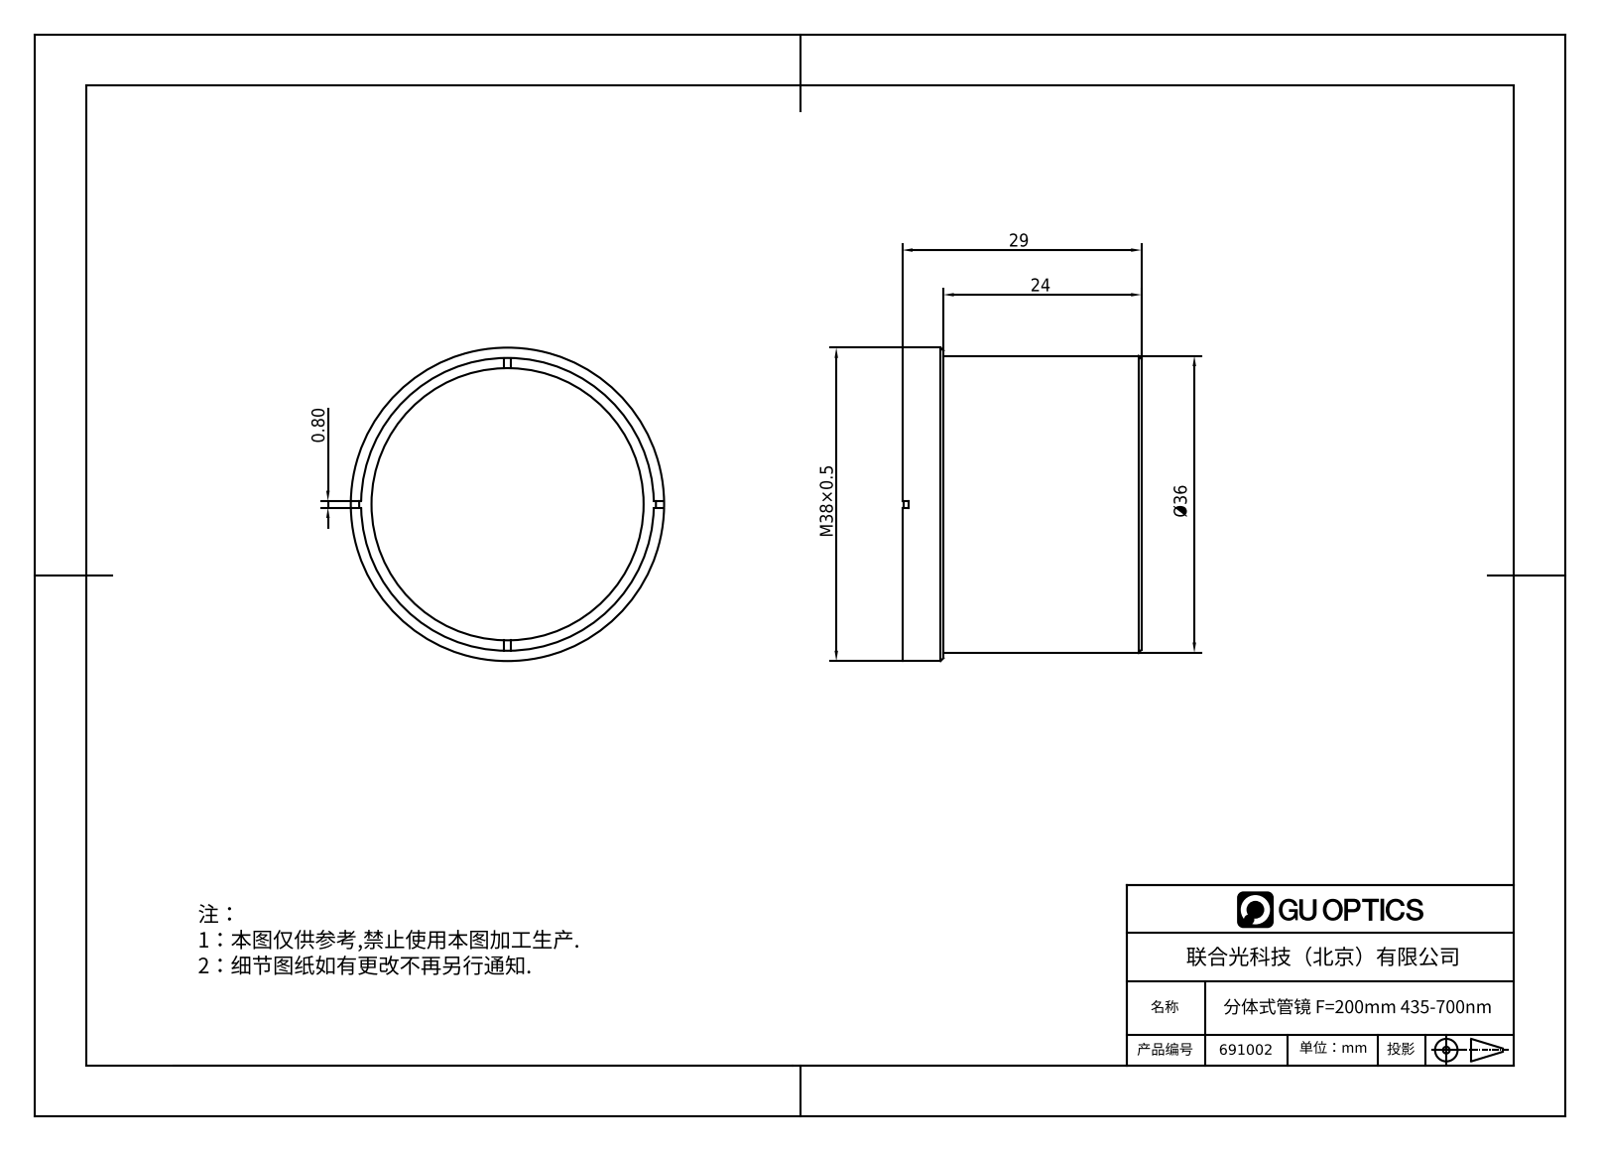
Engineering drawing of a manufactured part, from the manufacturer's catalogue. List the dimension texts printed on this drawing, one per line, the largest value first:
M38×0.5
Ø36
29
24
0.80
